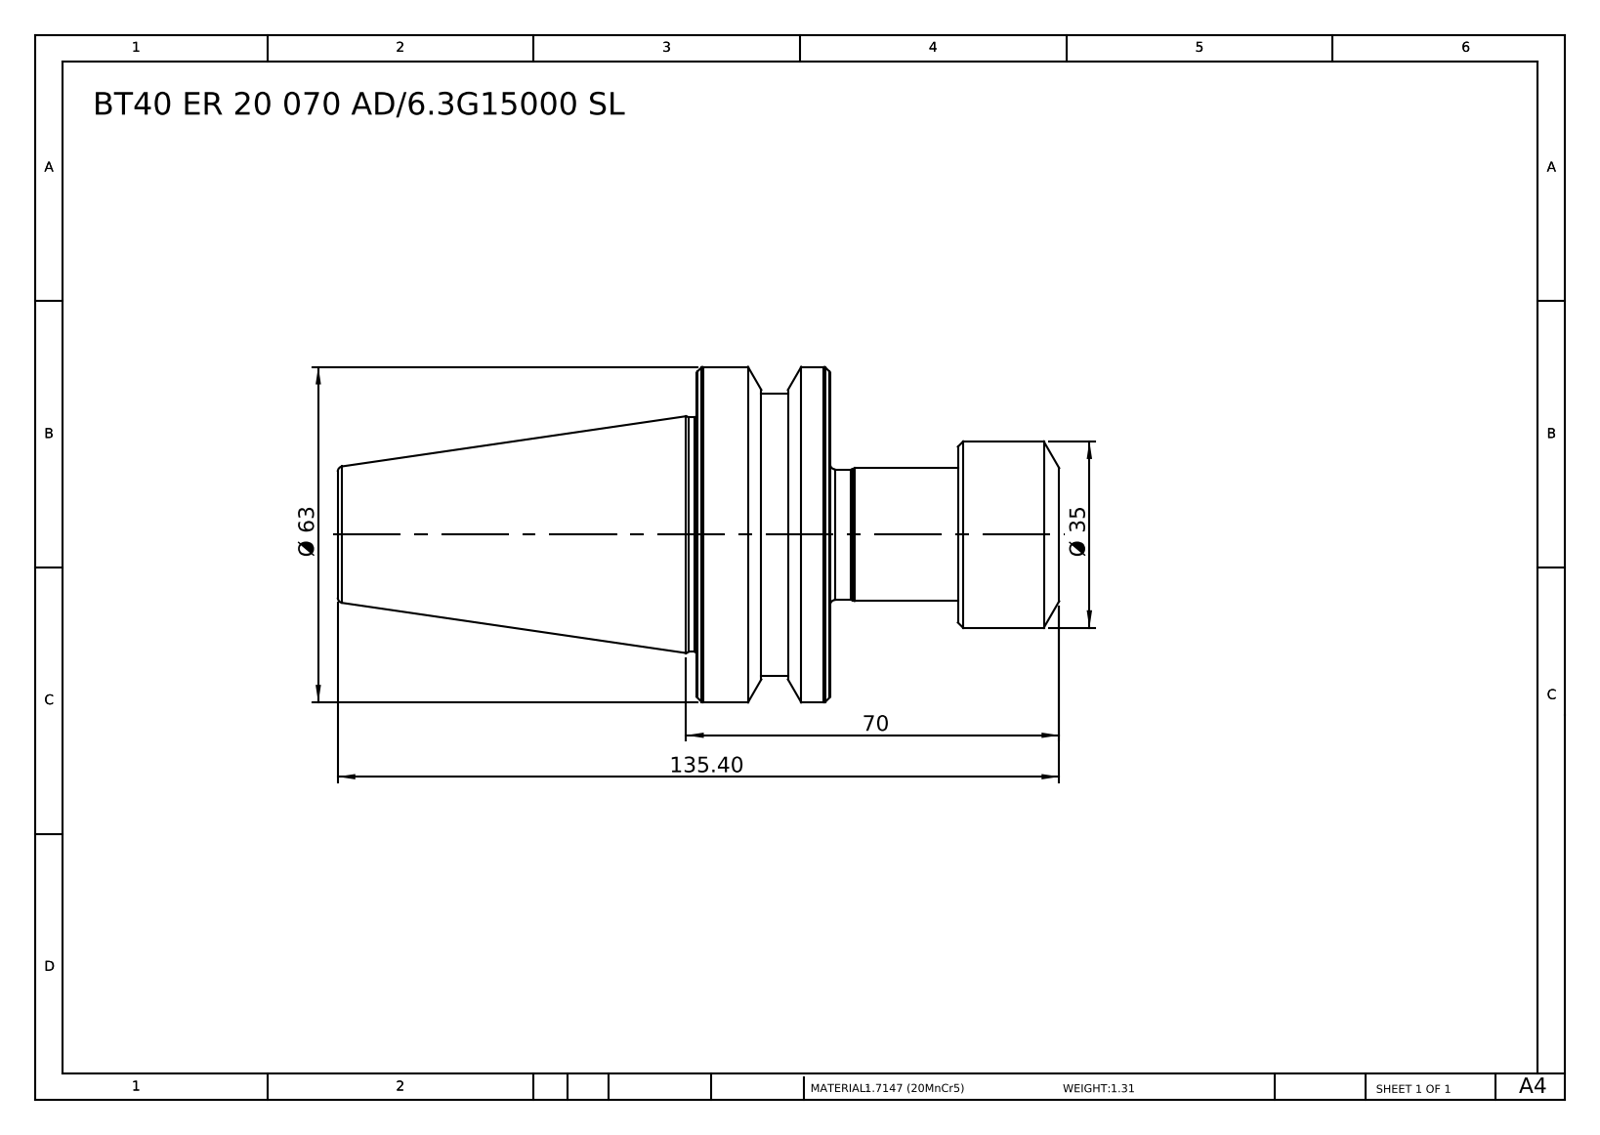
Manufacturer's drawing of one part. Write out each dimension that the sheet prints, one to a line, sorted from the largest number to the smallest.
135.40
70
Ø 63
Ø 35
